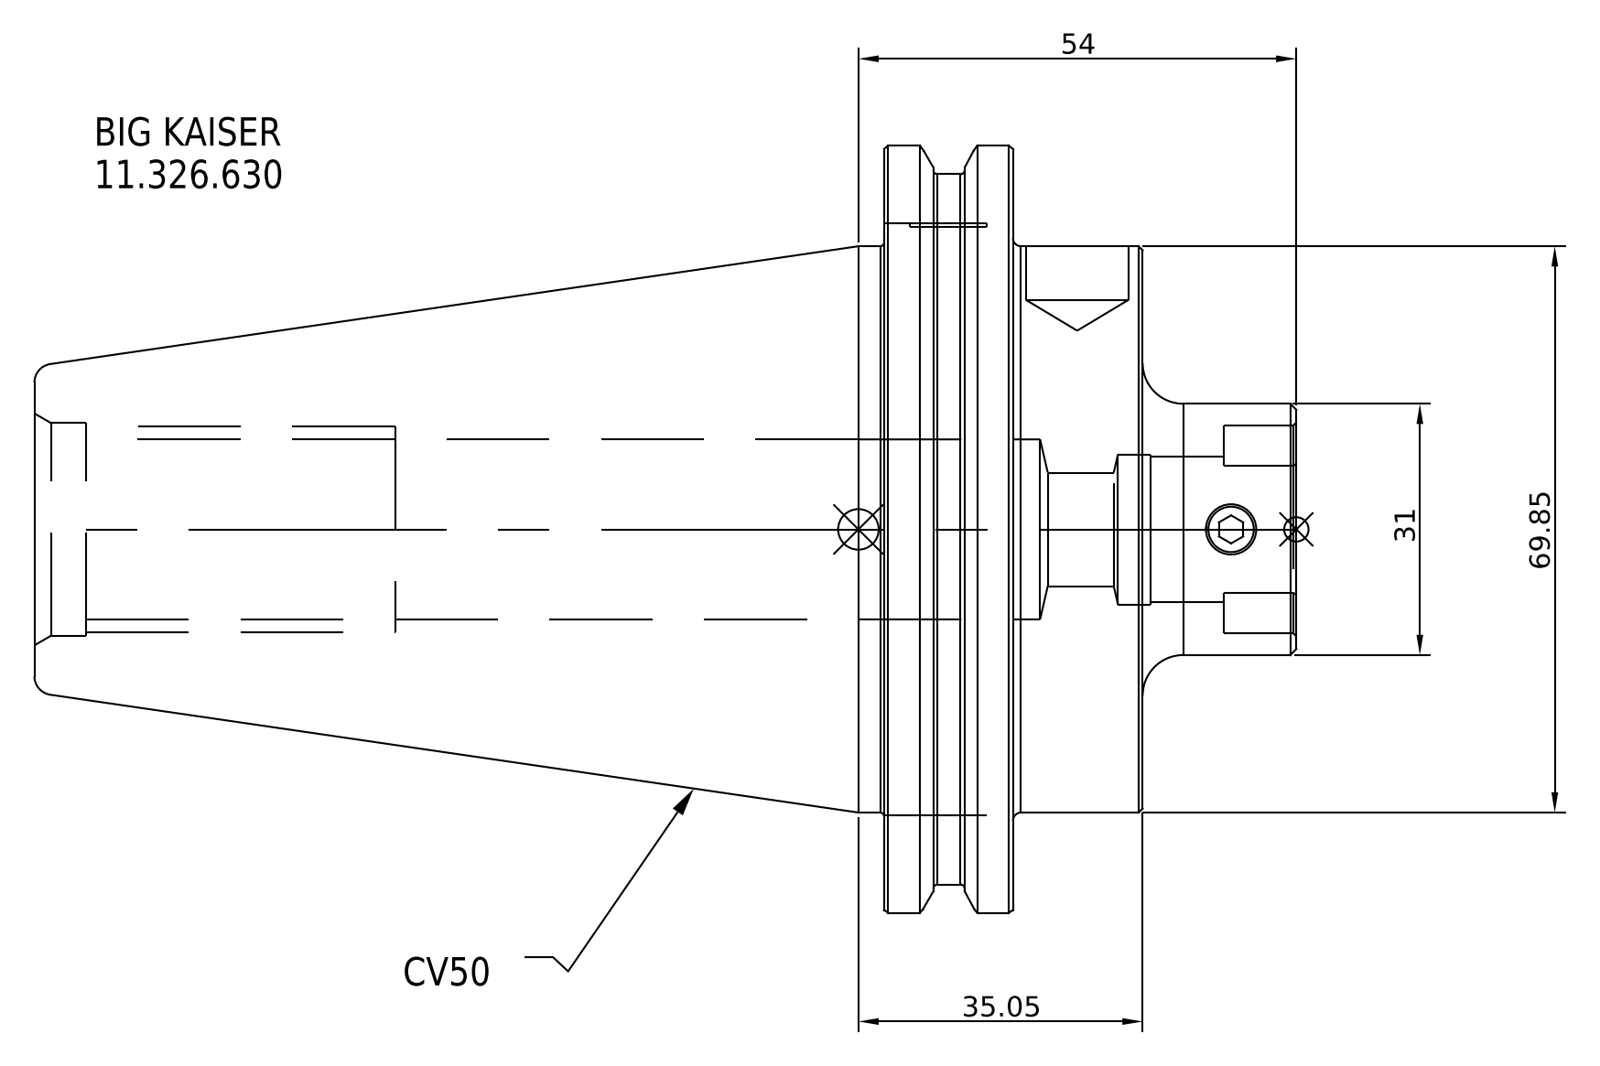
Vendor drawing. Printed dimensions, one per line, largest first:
69.85
54
35.05
31
